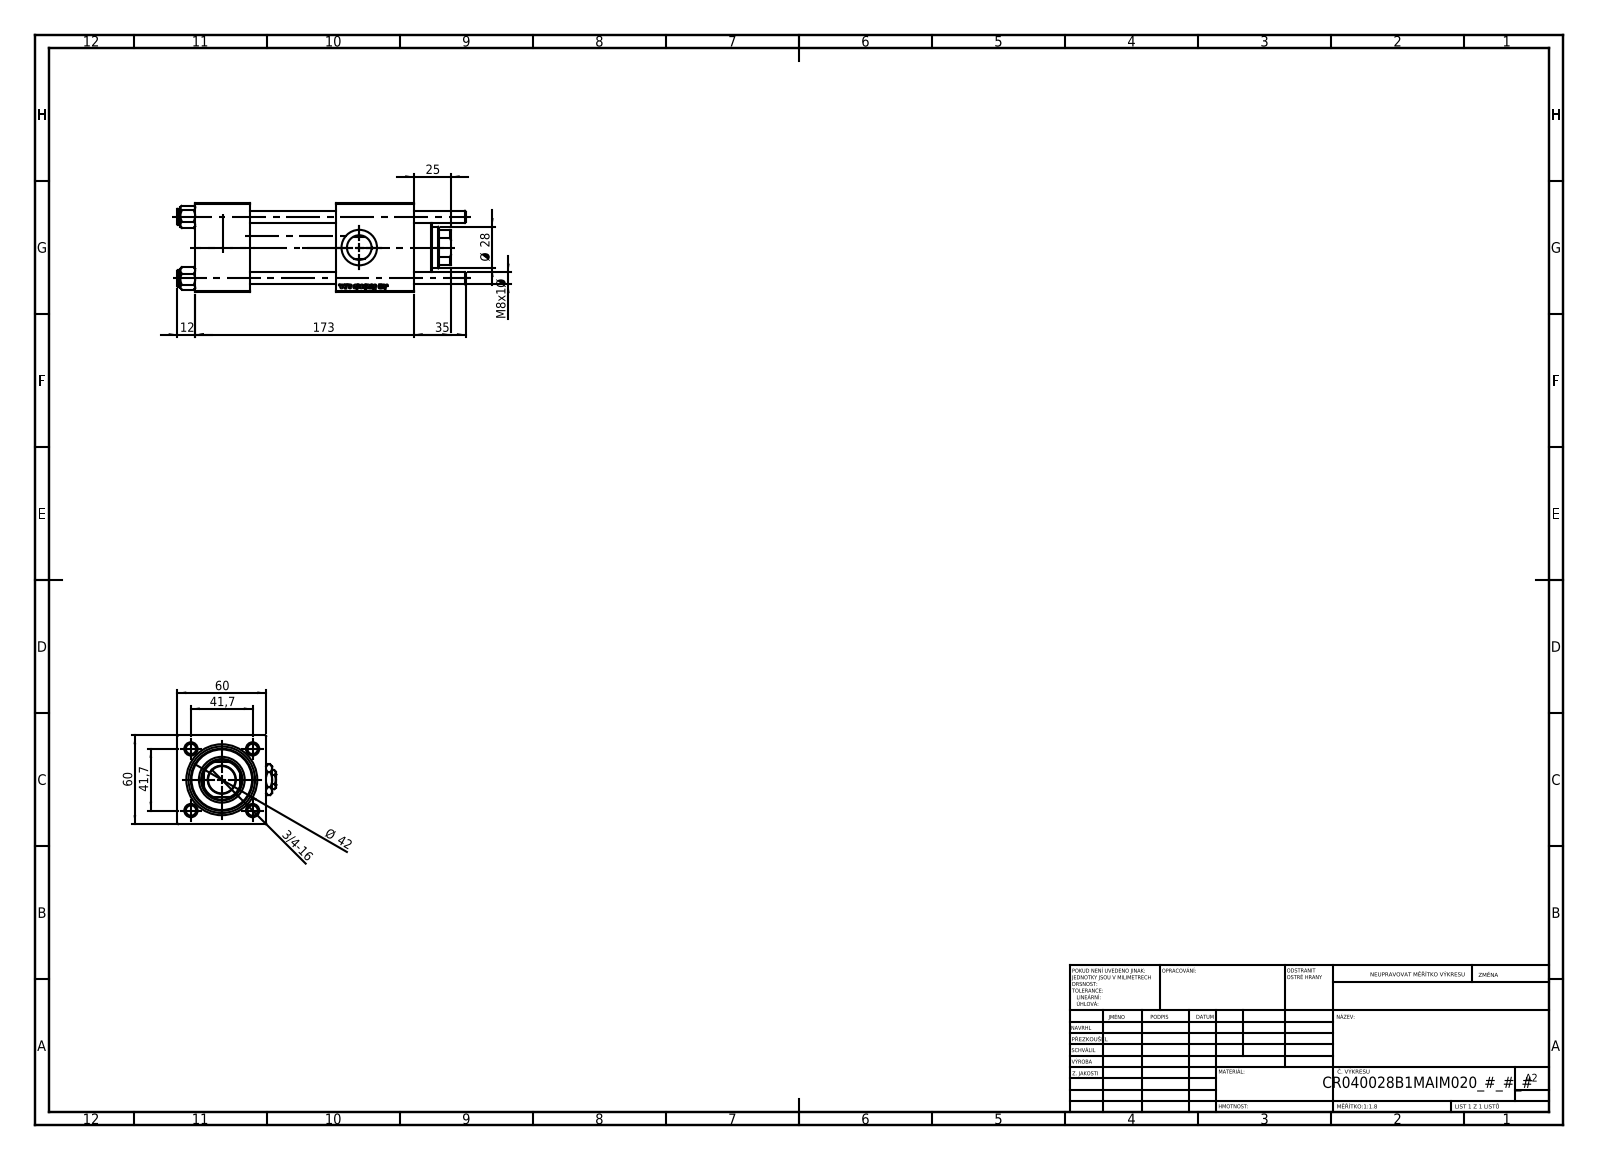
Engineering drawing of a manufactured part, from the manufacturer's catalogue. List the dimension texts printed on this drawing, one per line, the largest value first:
173
60
60
Ø 42
41,7
41,7
35
Ø 28
25
12
M8x1 Ø
3/4-16
